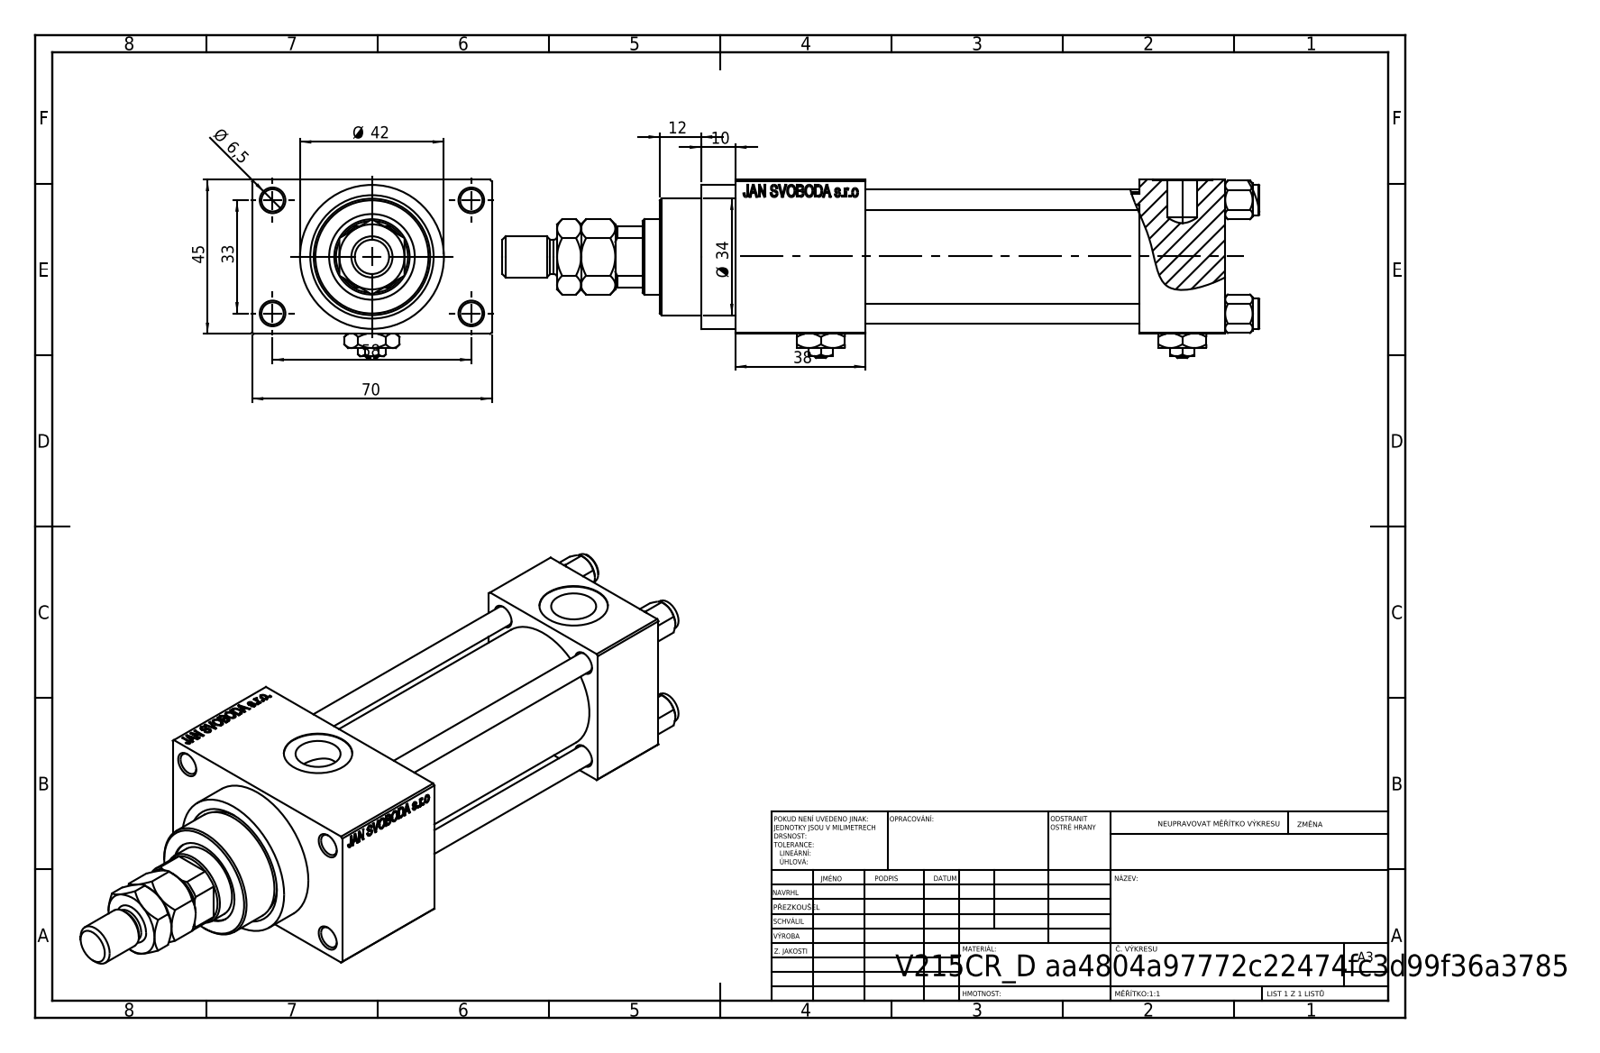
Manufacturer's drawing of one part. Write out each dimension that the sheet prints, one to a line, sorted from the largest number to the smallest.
70
58
45
Ø 42
38
Ø 34
33
12
10
Ø 6,5
